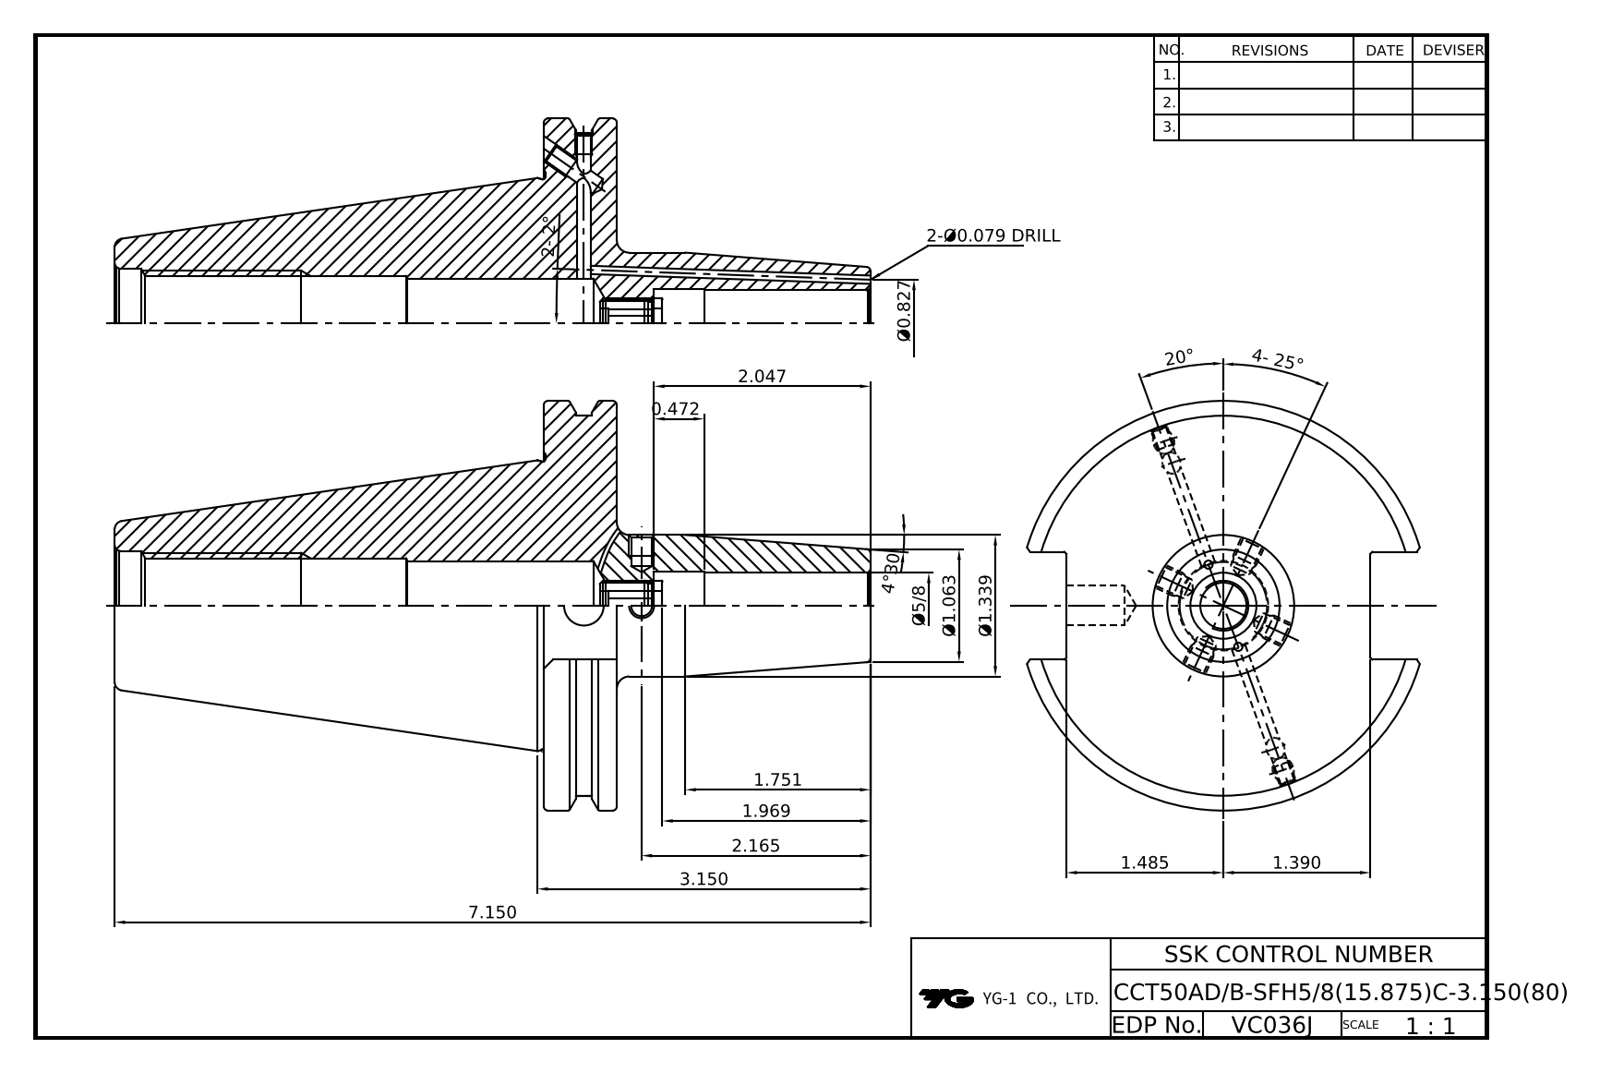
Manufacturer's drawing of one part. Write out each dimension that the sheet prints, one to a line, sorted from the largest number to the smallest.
20°
7.150
4°30'
4- 25°
3.150
2.165
2.047
2- 2°
1.969
1.751
1.485
1.390
Ø1.339
Ø1.063
Ø5/8
0.472
